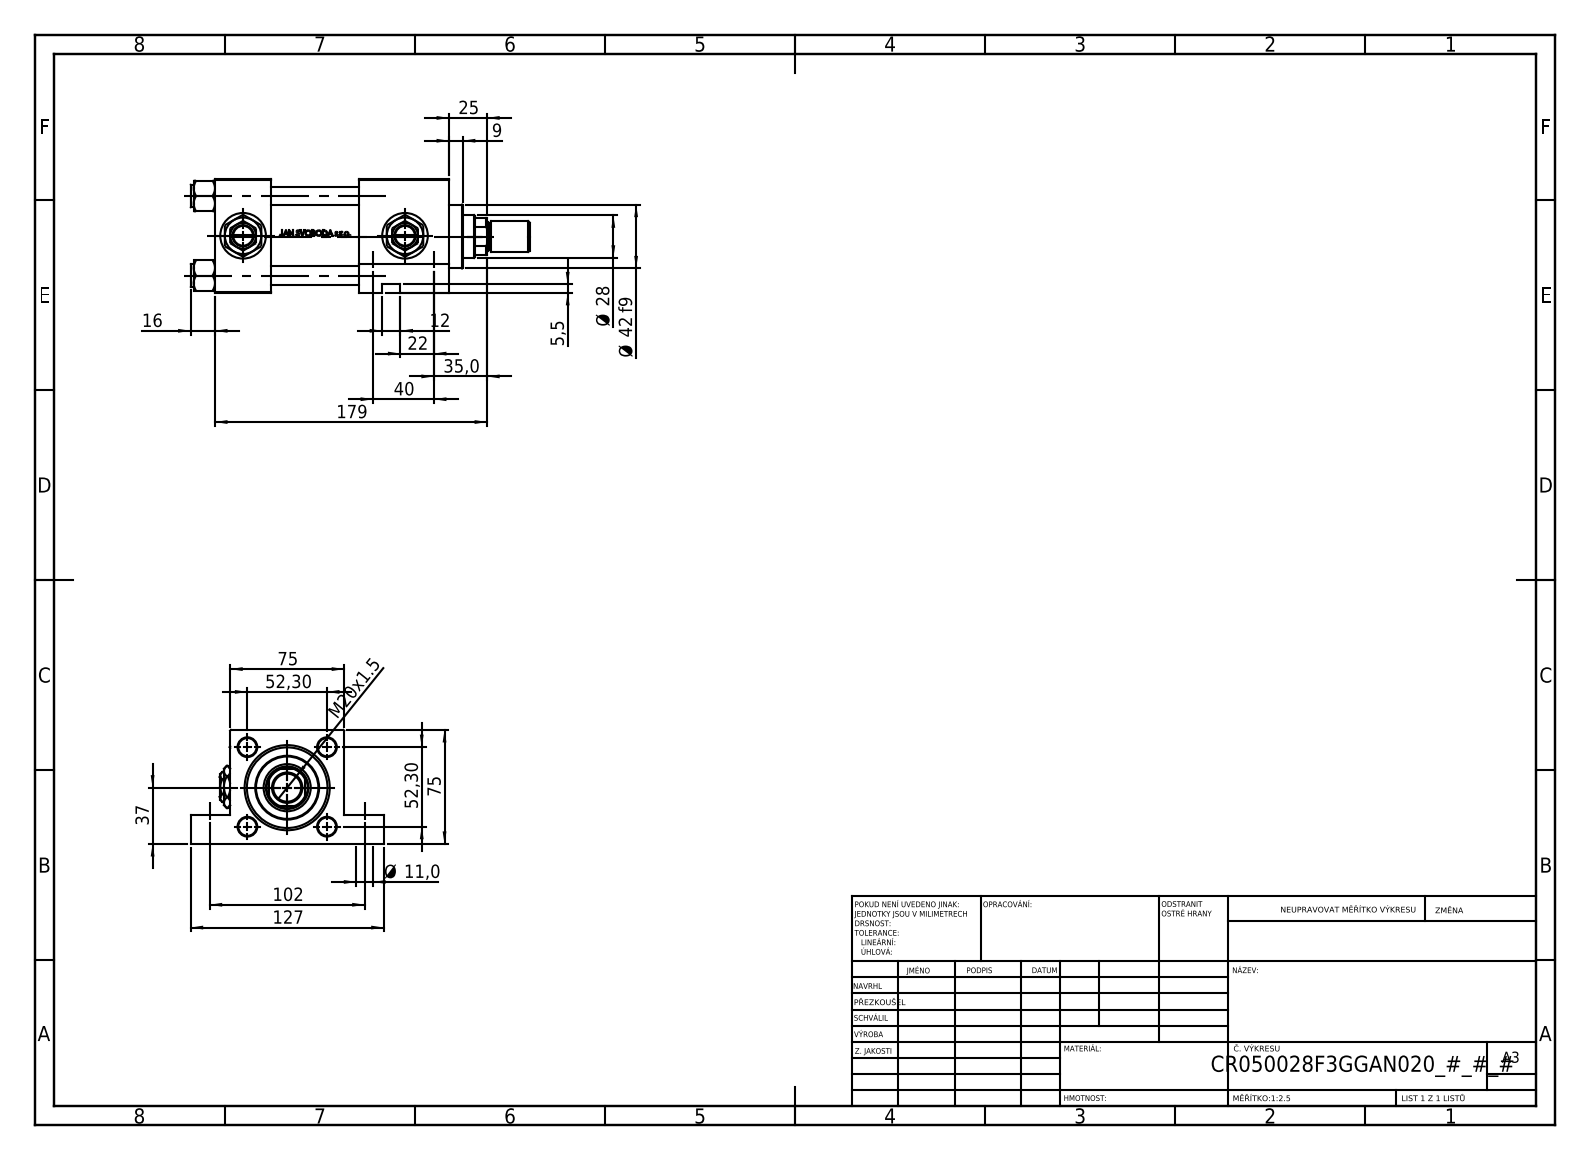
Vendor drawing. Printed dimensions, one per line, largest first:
179
127
102
75
75
52,30
52,30
Ø 42 f9
40
37
35,0
Ø 28
25
22
M20x1.5
16
12
Ø 11,0
9
5,5
